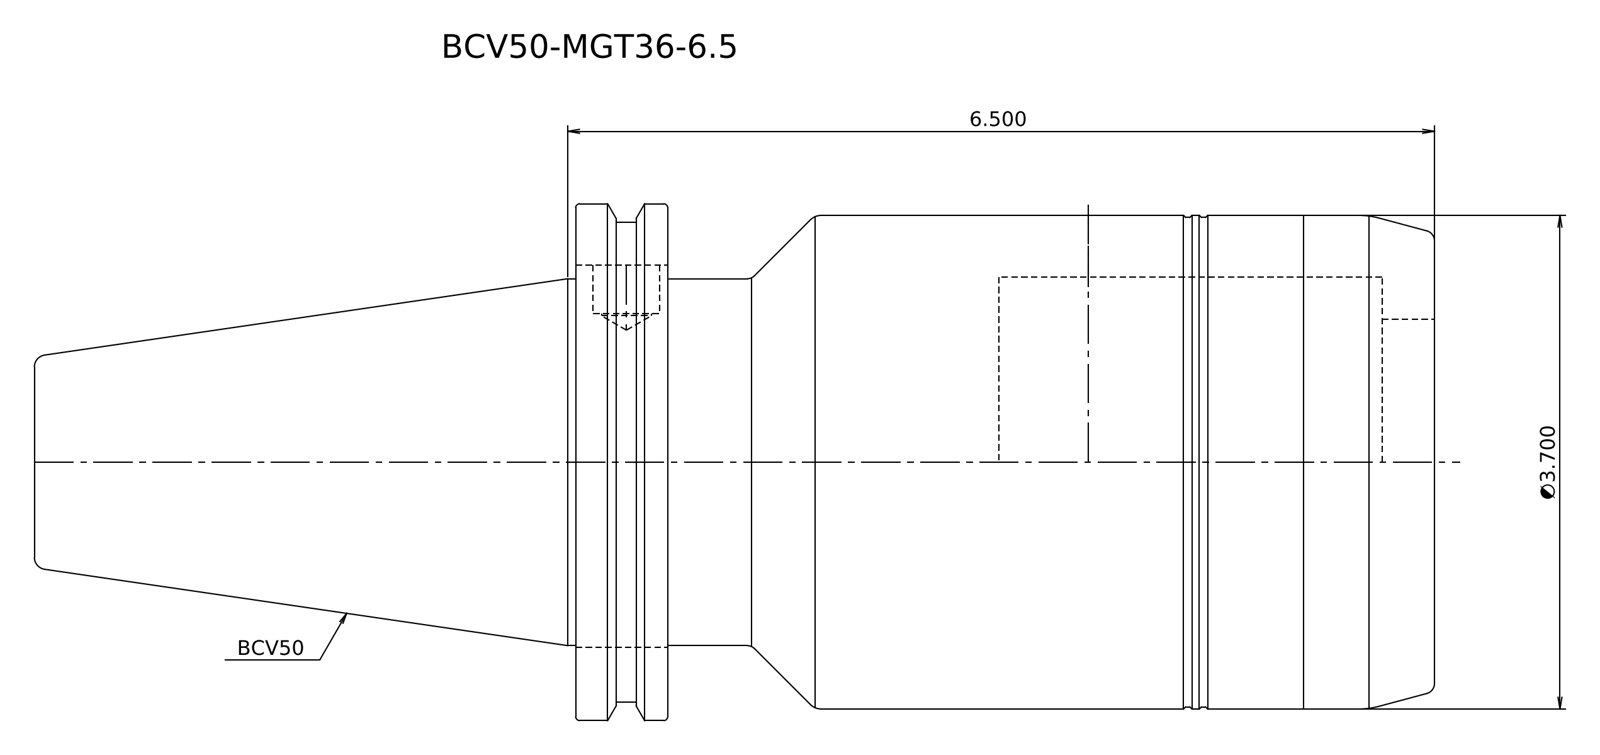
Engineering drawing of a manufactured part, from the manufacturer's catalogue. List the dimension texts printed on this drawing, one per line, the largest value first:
6.500
Ø3.700
